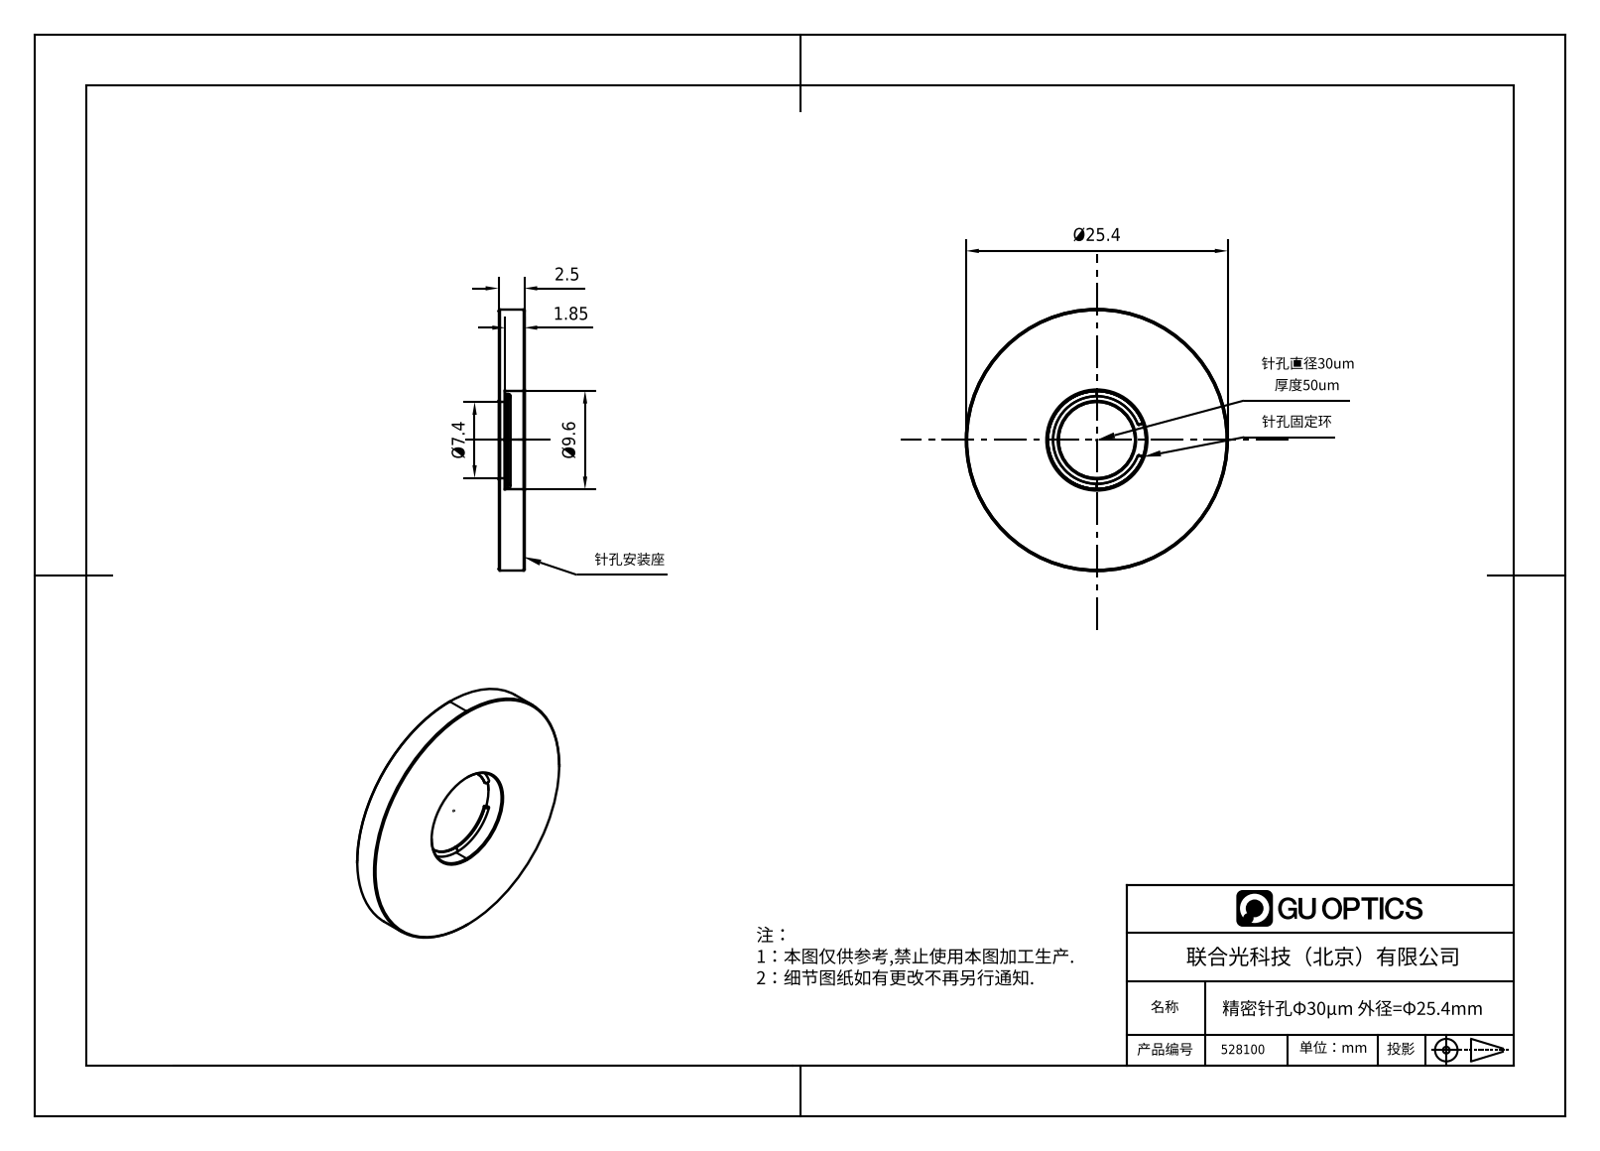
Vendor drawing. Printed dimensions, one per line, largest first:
Ø25.4
Ø9.6
Ø7.4
2.5
1.85
